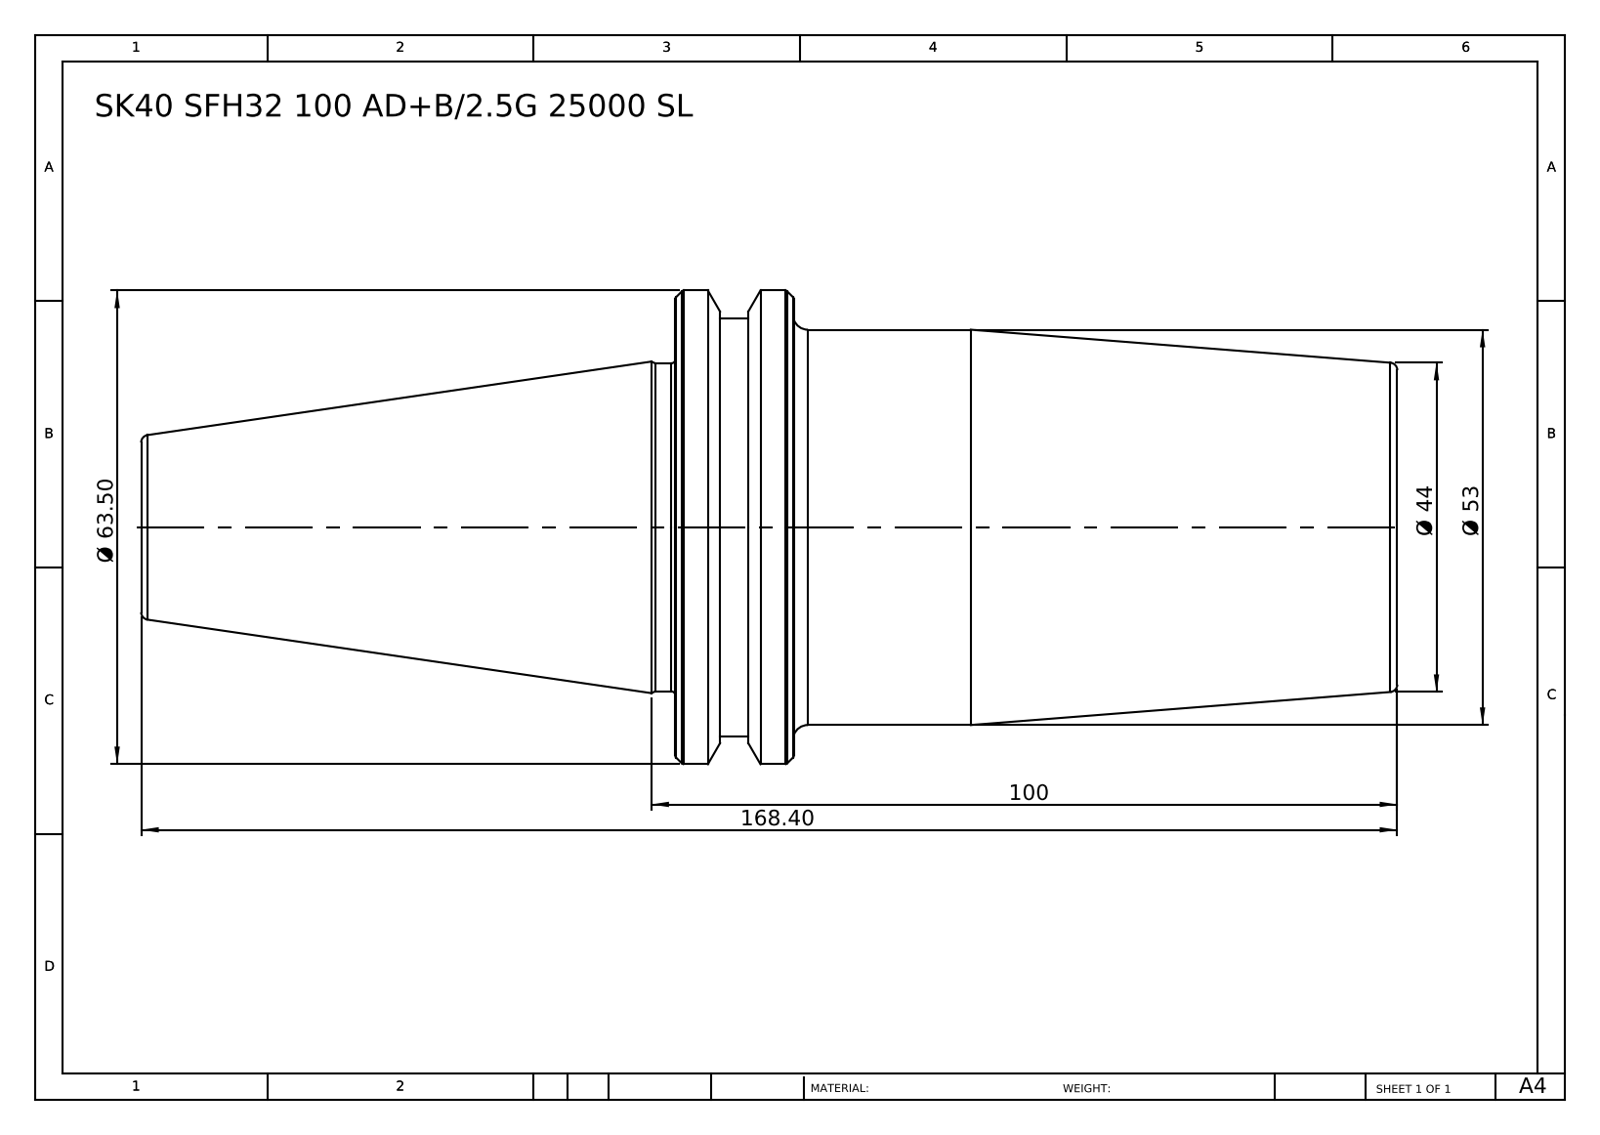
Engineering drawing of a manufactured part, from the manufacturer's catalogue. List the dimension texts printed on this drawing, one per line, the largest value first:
168.40
100
Ø 63.50
Ø 53
Ø 44
